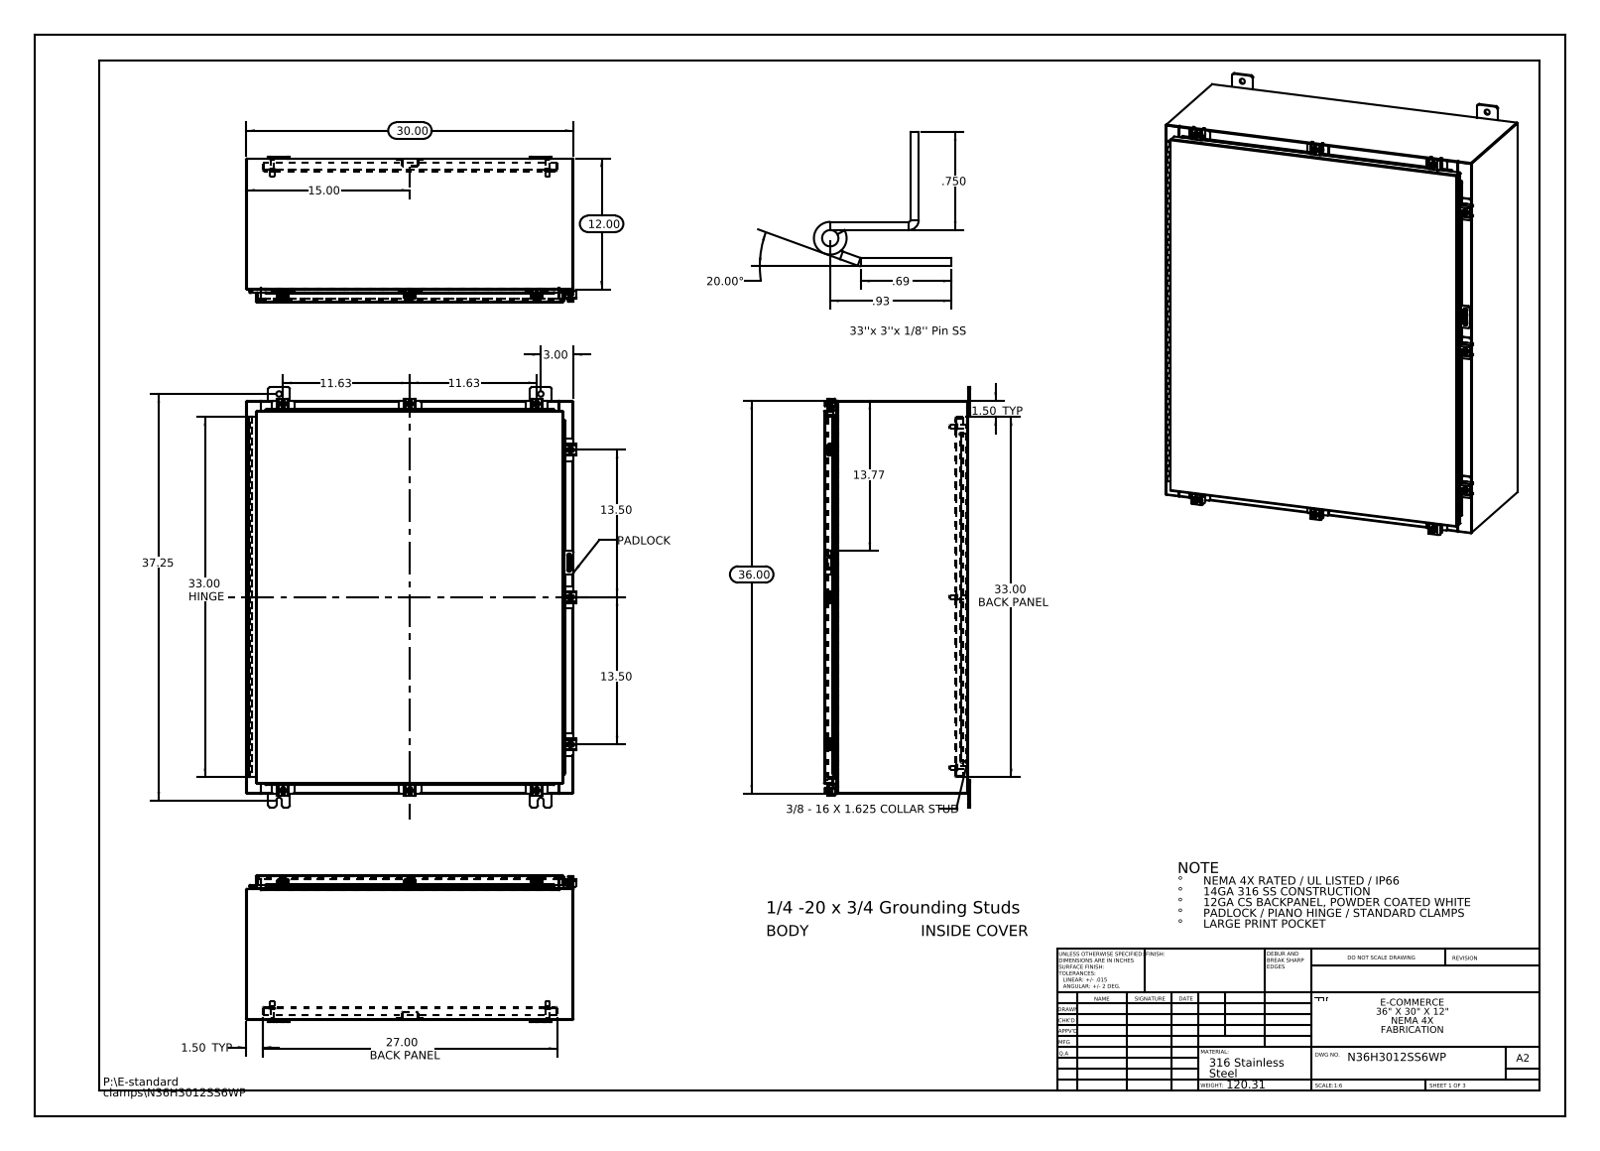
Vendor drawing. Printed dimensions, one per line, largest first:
37.25
36.00
33.00 HINGE
33.00 BACK PANEL
30.00
27.00 BACK PANEL
20.00°
15.00
13.77
13.50
13.50
12.00
11.63
11.63
3.00
1.50 TYP
1.50 TYP
.93
.750
.69
